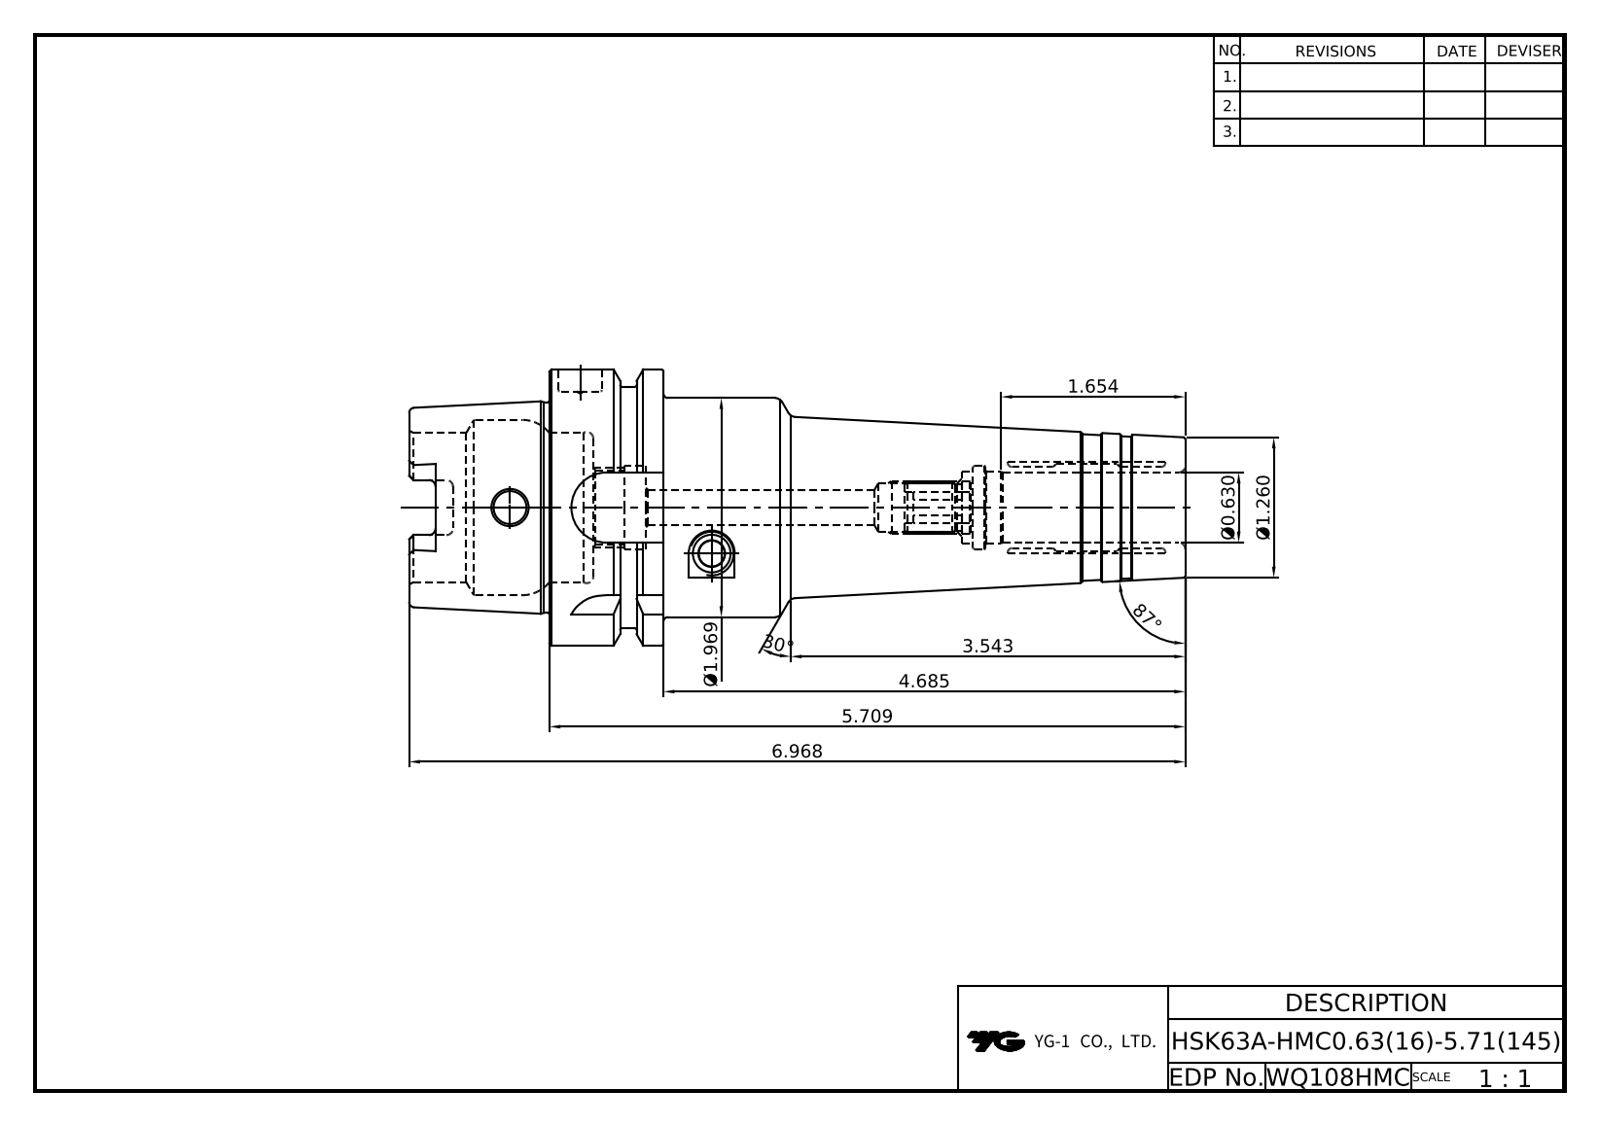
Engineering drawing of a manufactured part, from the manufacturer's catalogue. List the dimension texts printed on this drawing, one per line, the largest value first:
87°
30°
6.968
5.709
4.685
3.543
Ø1.969
1.654
Ø1.260
Ø0.630
